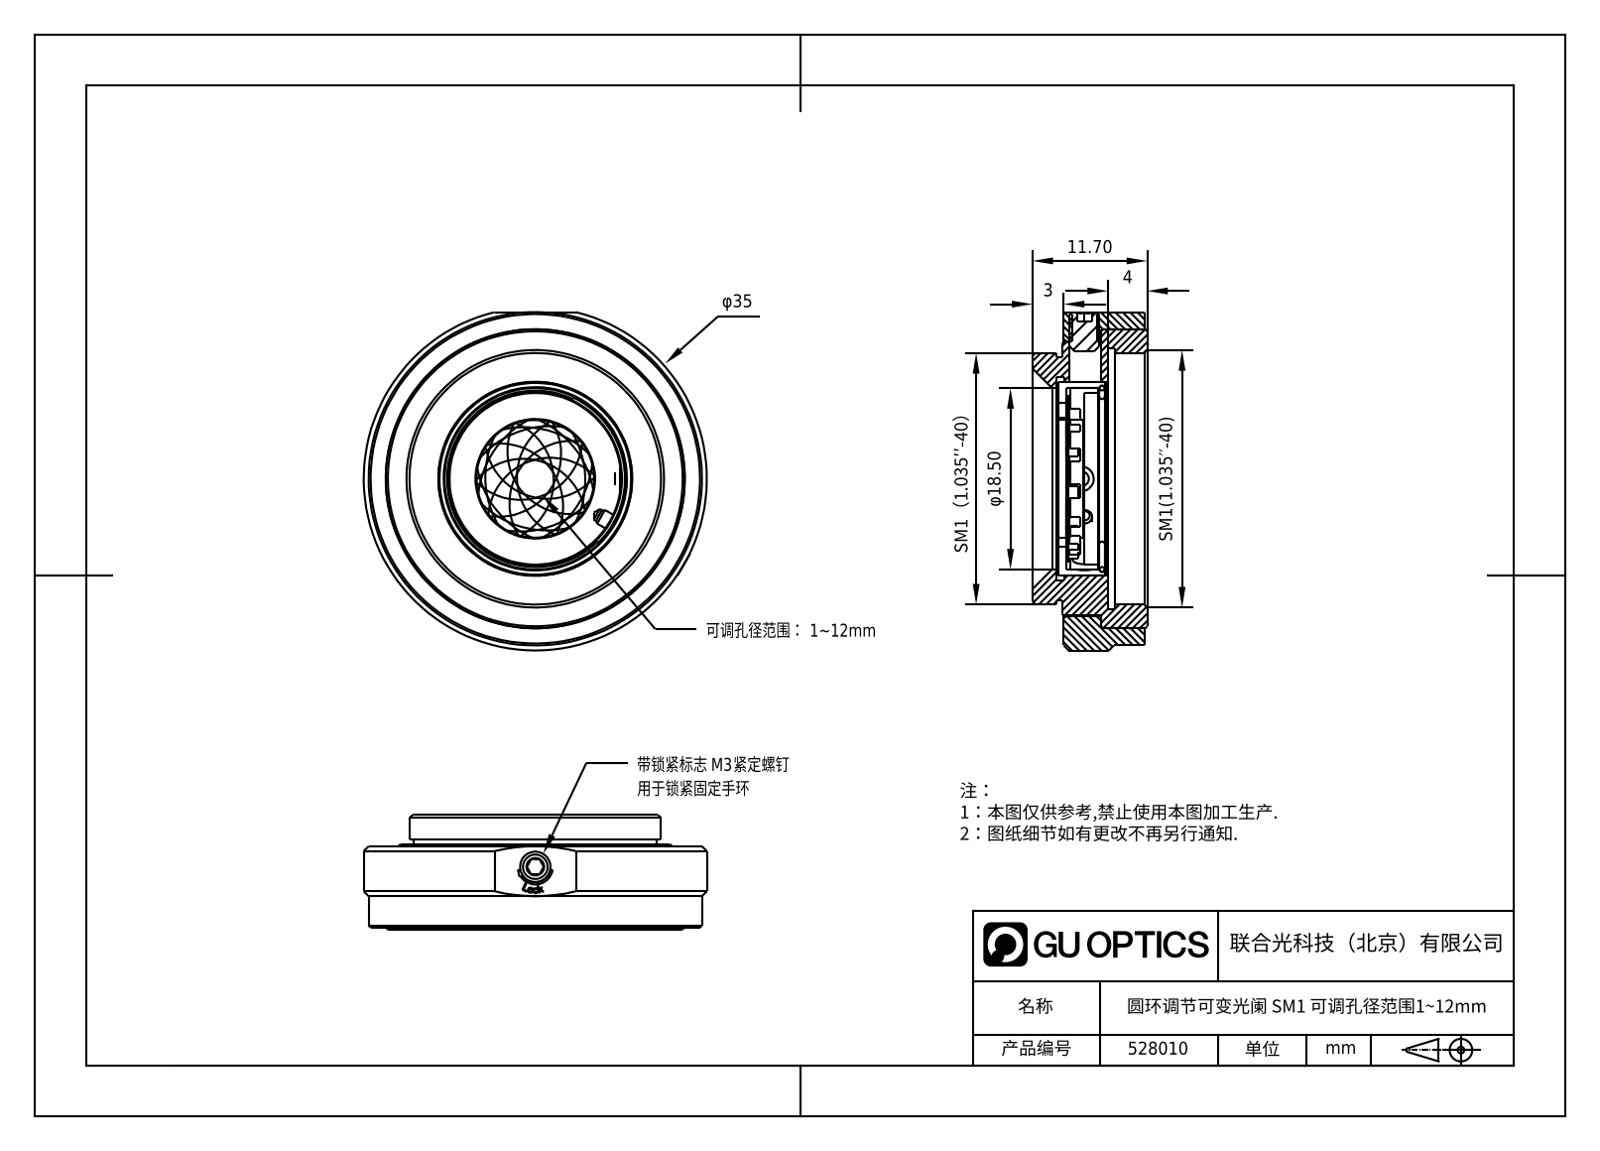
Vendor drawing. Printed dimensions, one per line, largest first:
φ18.50
11.70
4
3
SM1(1.035′′-40)
SM1（1.035′′-40）
